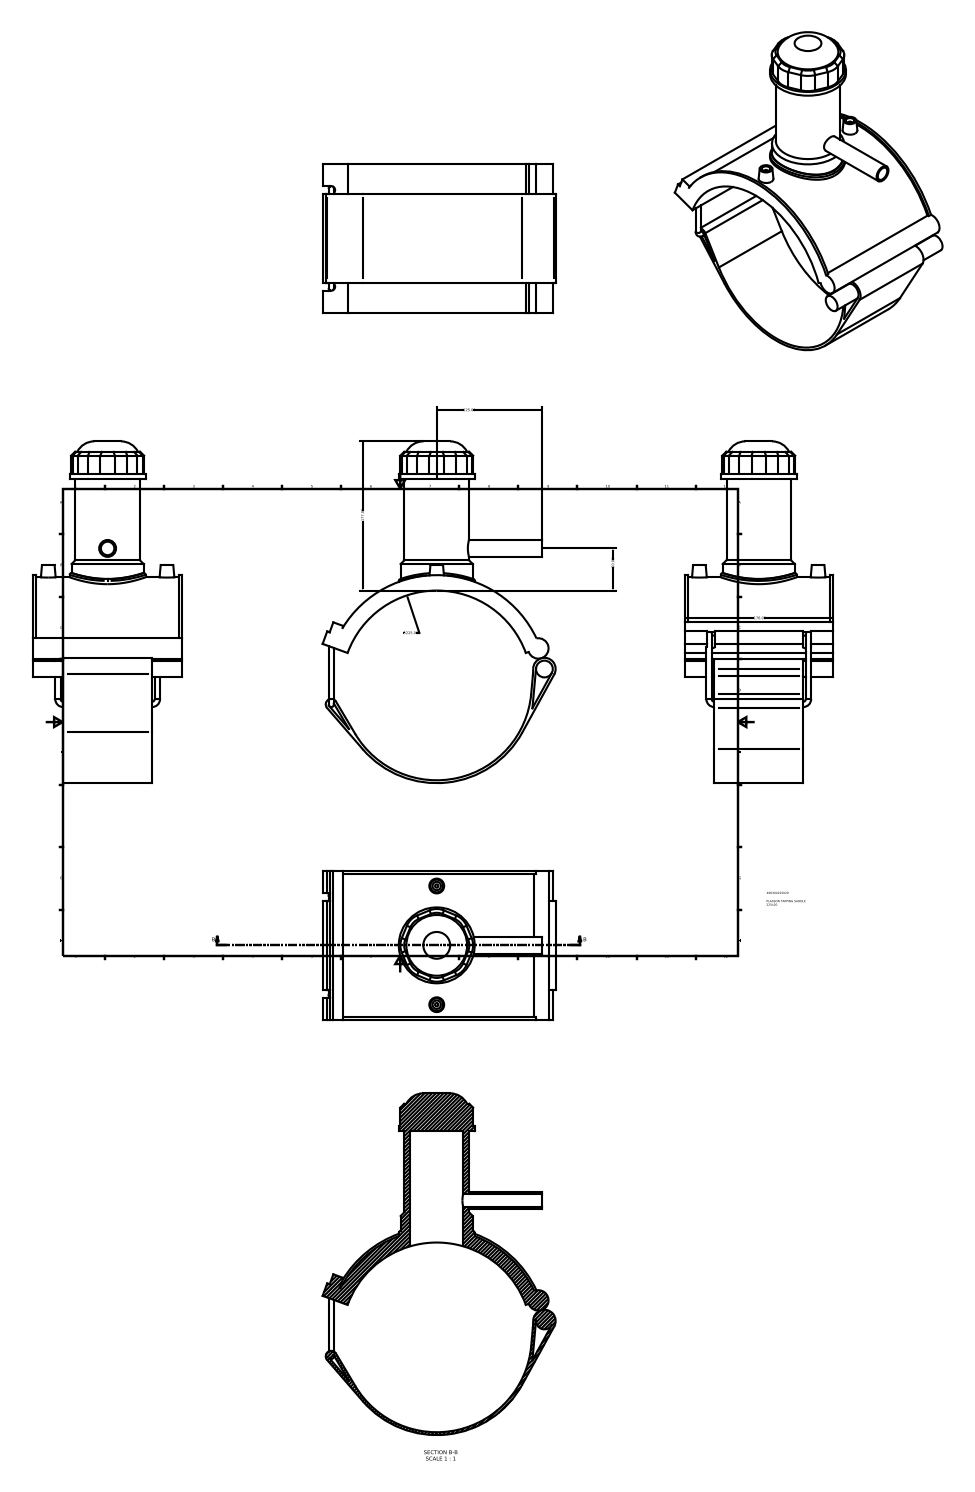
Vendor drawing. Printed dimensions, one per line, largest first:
∅225.00
177.00
176.00
125.00
50.00
